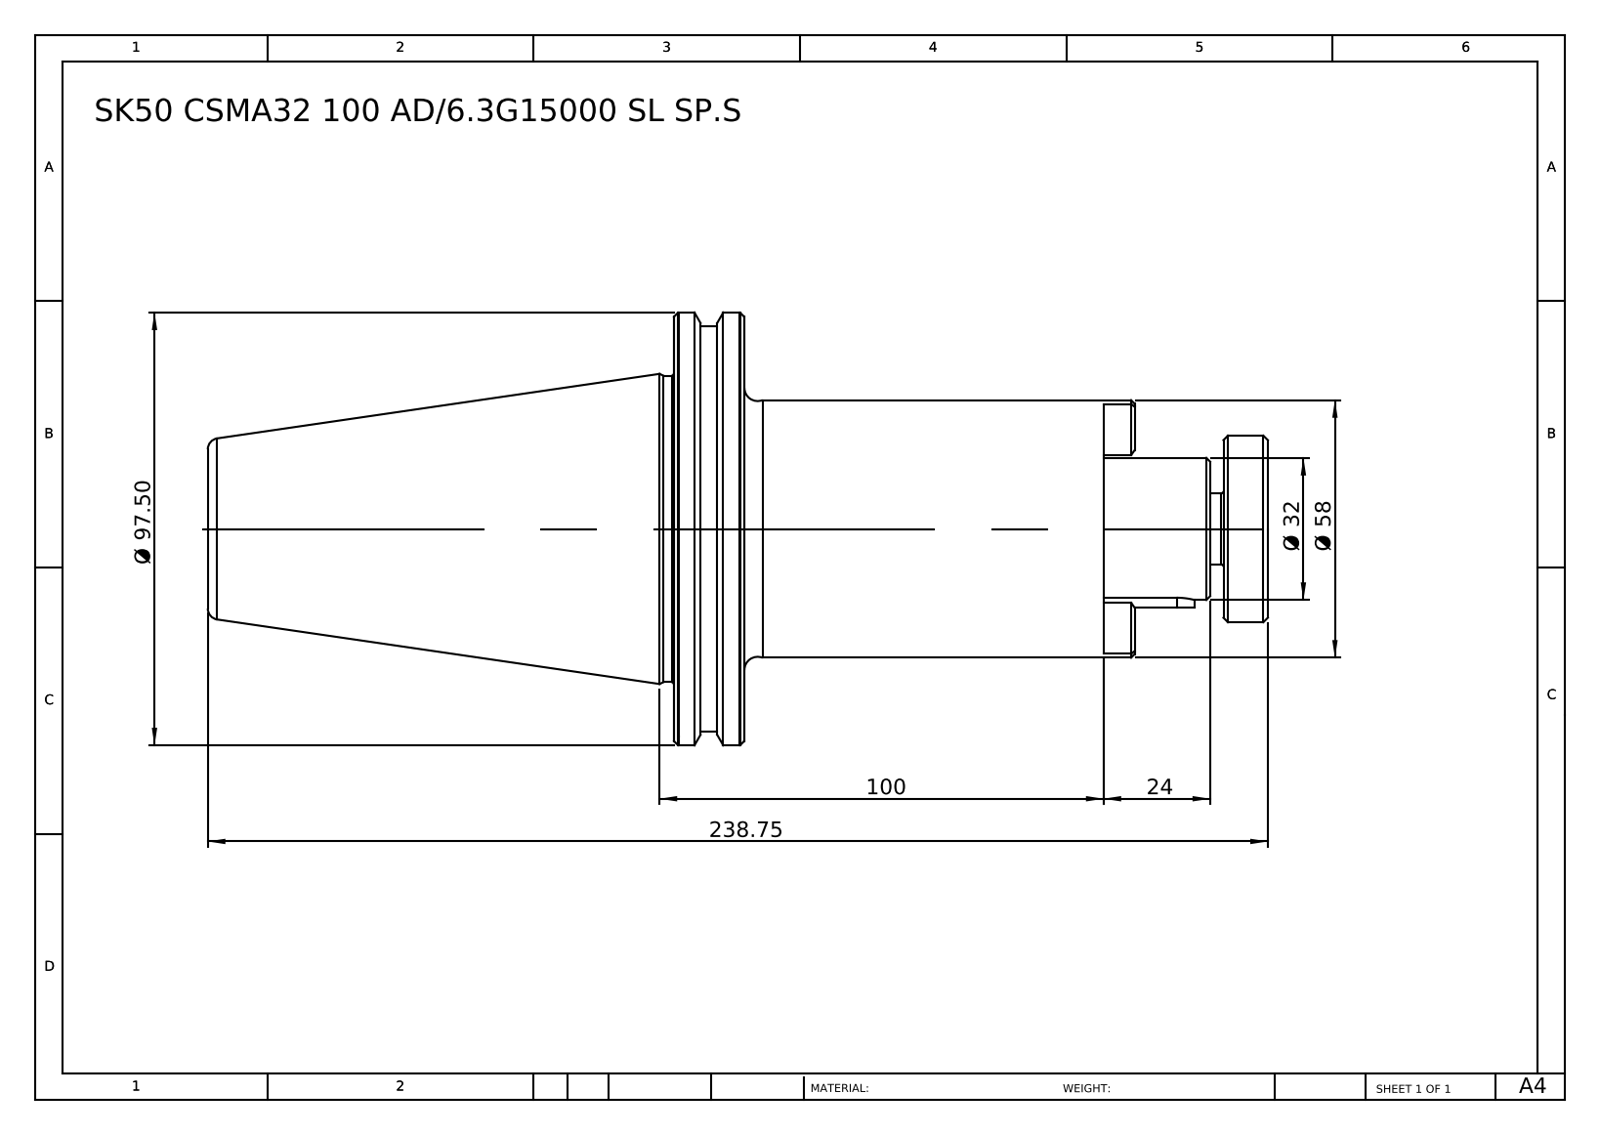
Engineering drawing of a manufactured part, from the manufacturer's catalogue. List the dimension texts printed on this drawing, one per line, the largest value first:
238.75
100
Ø 97.50
Ø 58
Ø 32
24
